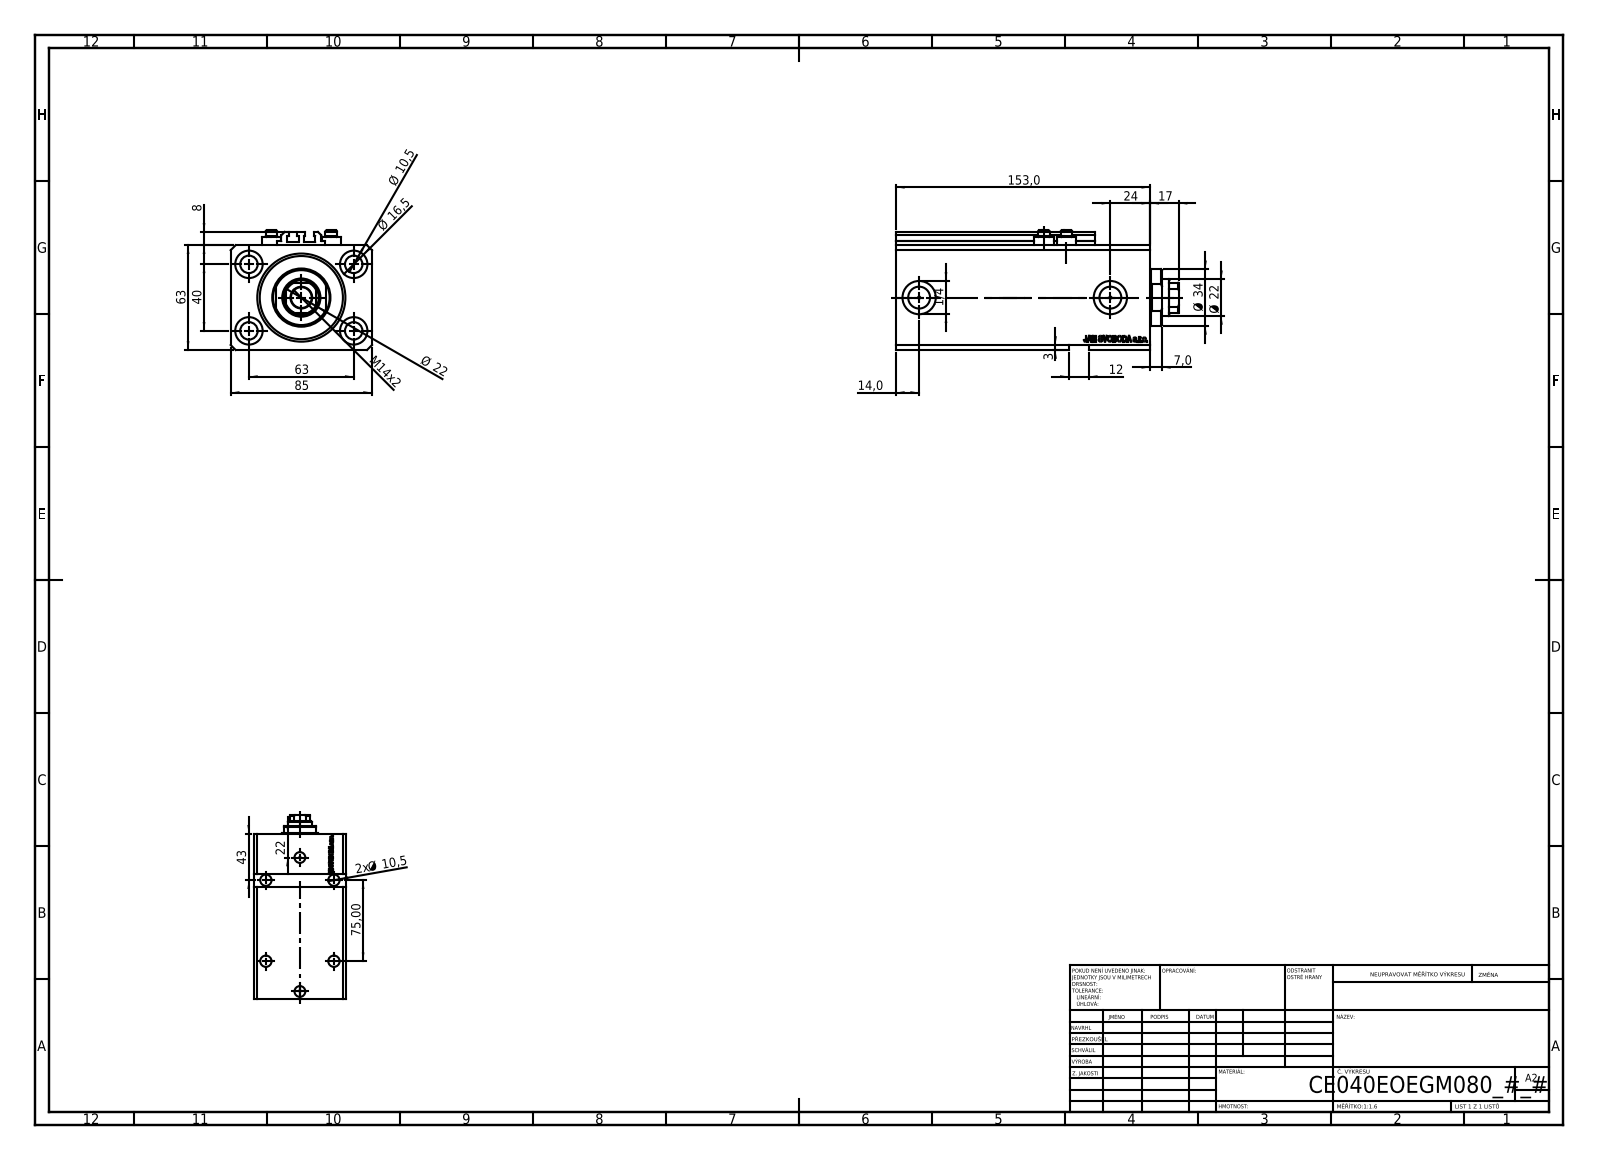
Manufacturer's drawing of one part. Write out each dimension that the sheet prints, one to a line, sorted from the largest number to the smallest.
153,0
85
75,00
63
63
43
40
Ø 34
24
Ø 22
Ø 22
22
17
Ø 16,5
M14x2
14,0
12
Ø 10,5
2x Ø 10,5
8
7,0
3
1/4
